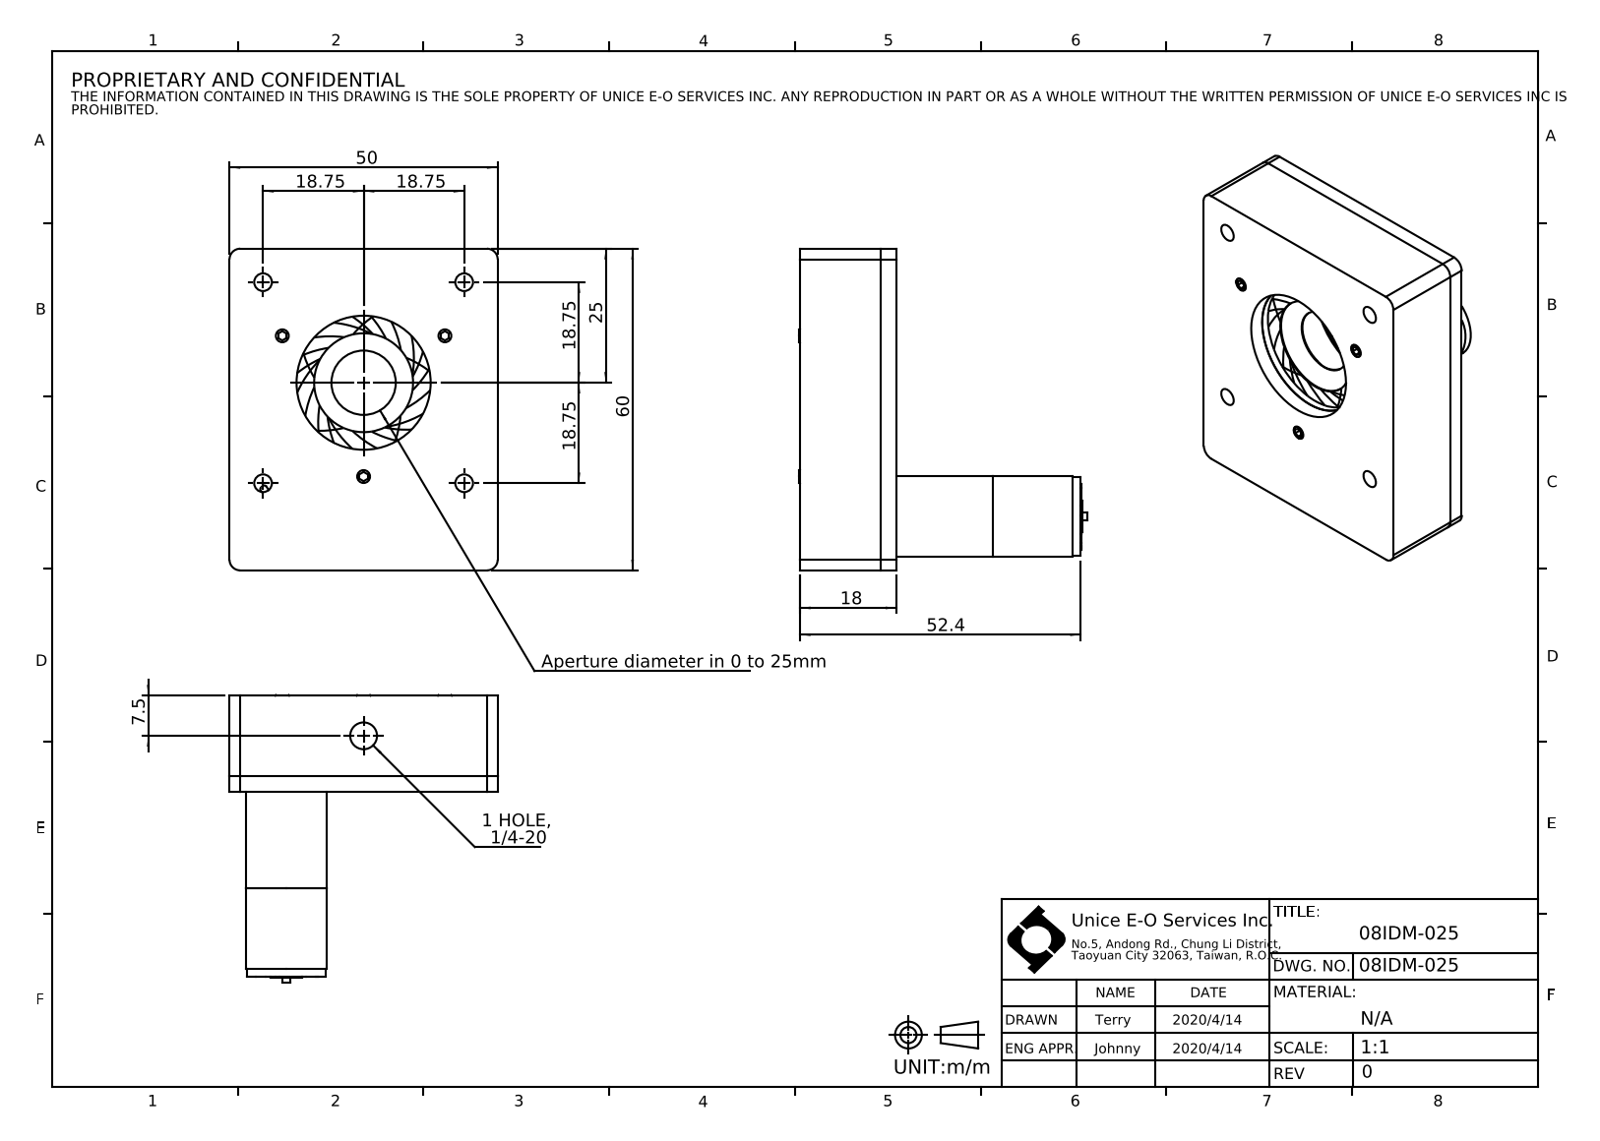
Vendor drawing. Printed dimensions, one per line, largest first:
60
52.4
50
25
18.75
18.75
18.75
18.75
18
7.5
Aperture diameter in 0 to 25mm
